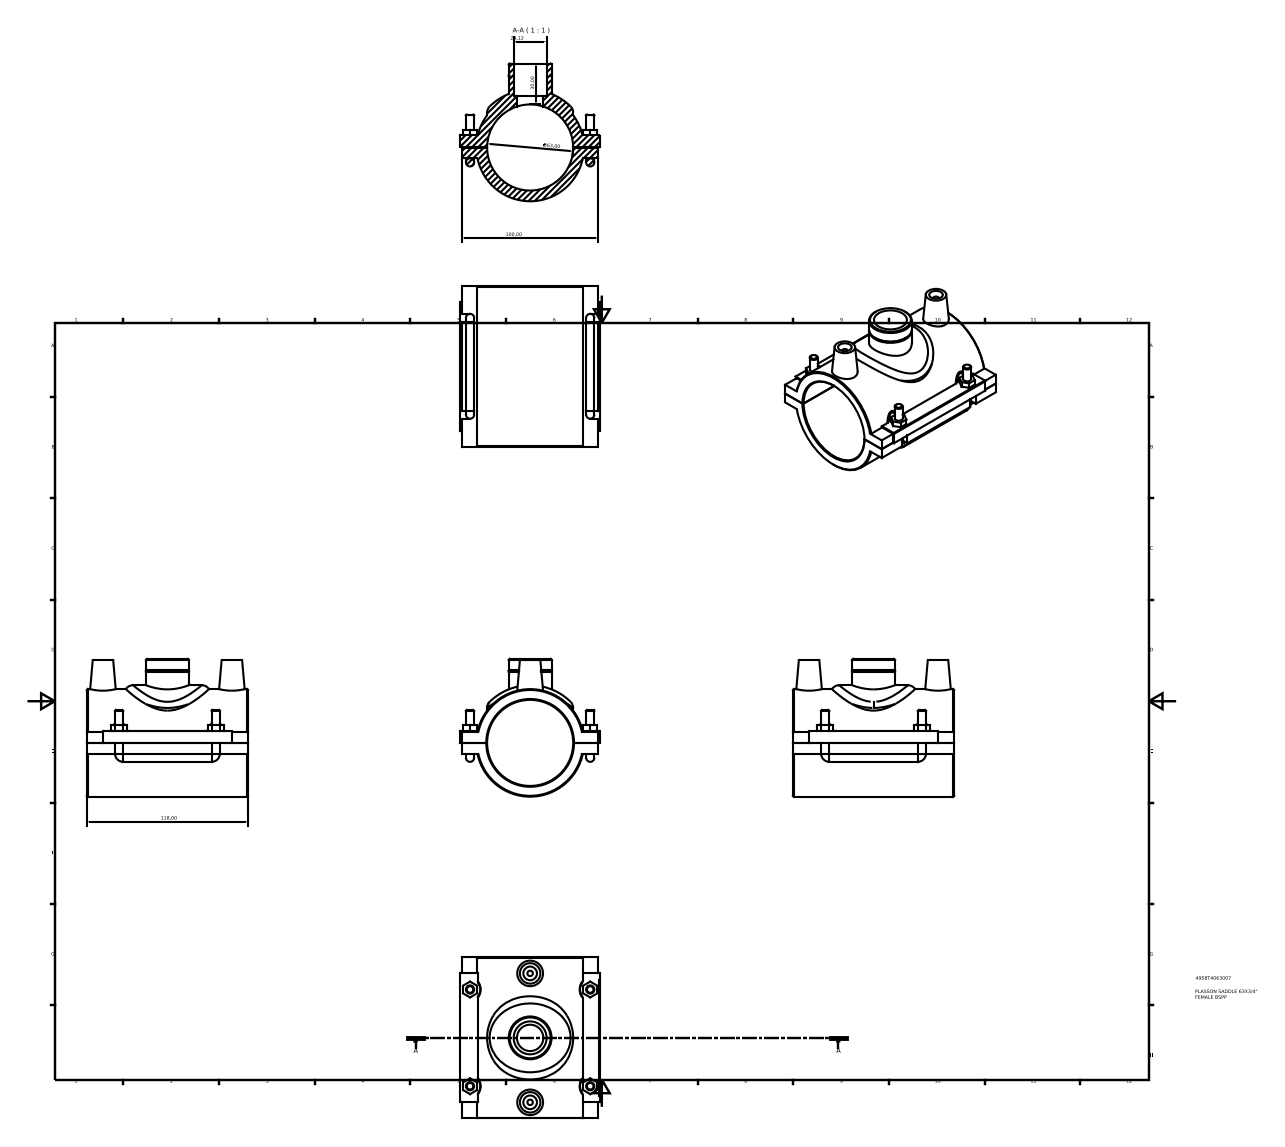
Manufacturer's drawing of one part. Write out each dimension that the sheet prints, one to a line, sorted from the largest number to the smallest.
118,00
100,00
∅63,00
30,00
24,12
